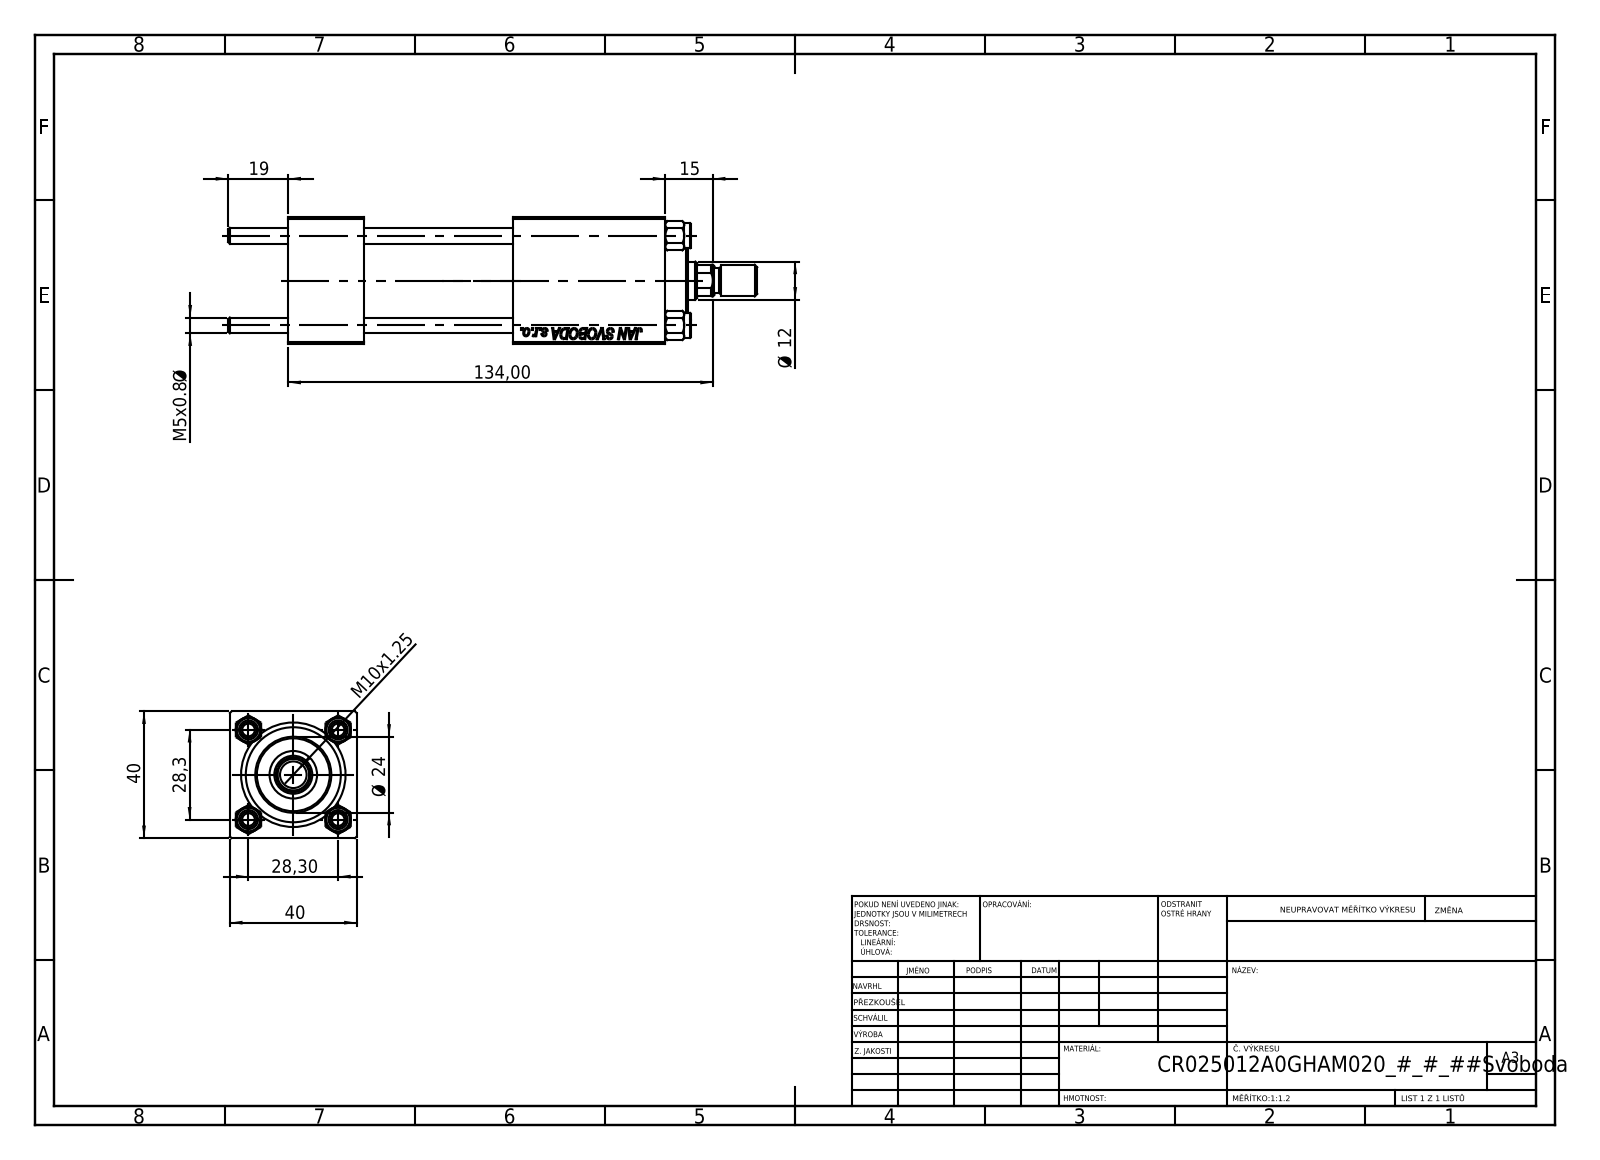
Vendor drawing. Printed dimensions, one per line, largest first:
134,00
40
40
28,3
28,30
Ø 24
19
15
Ø 12
M10x1.25
M5x0.8 Ø
